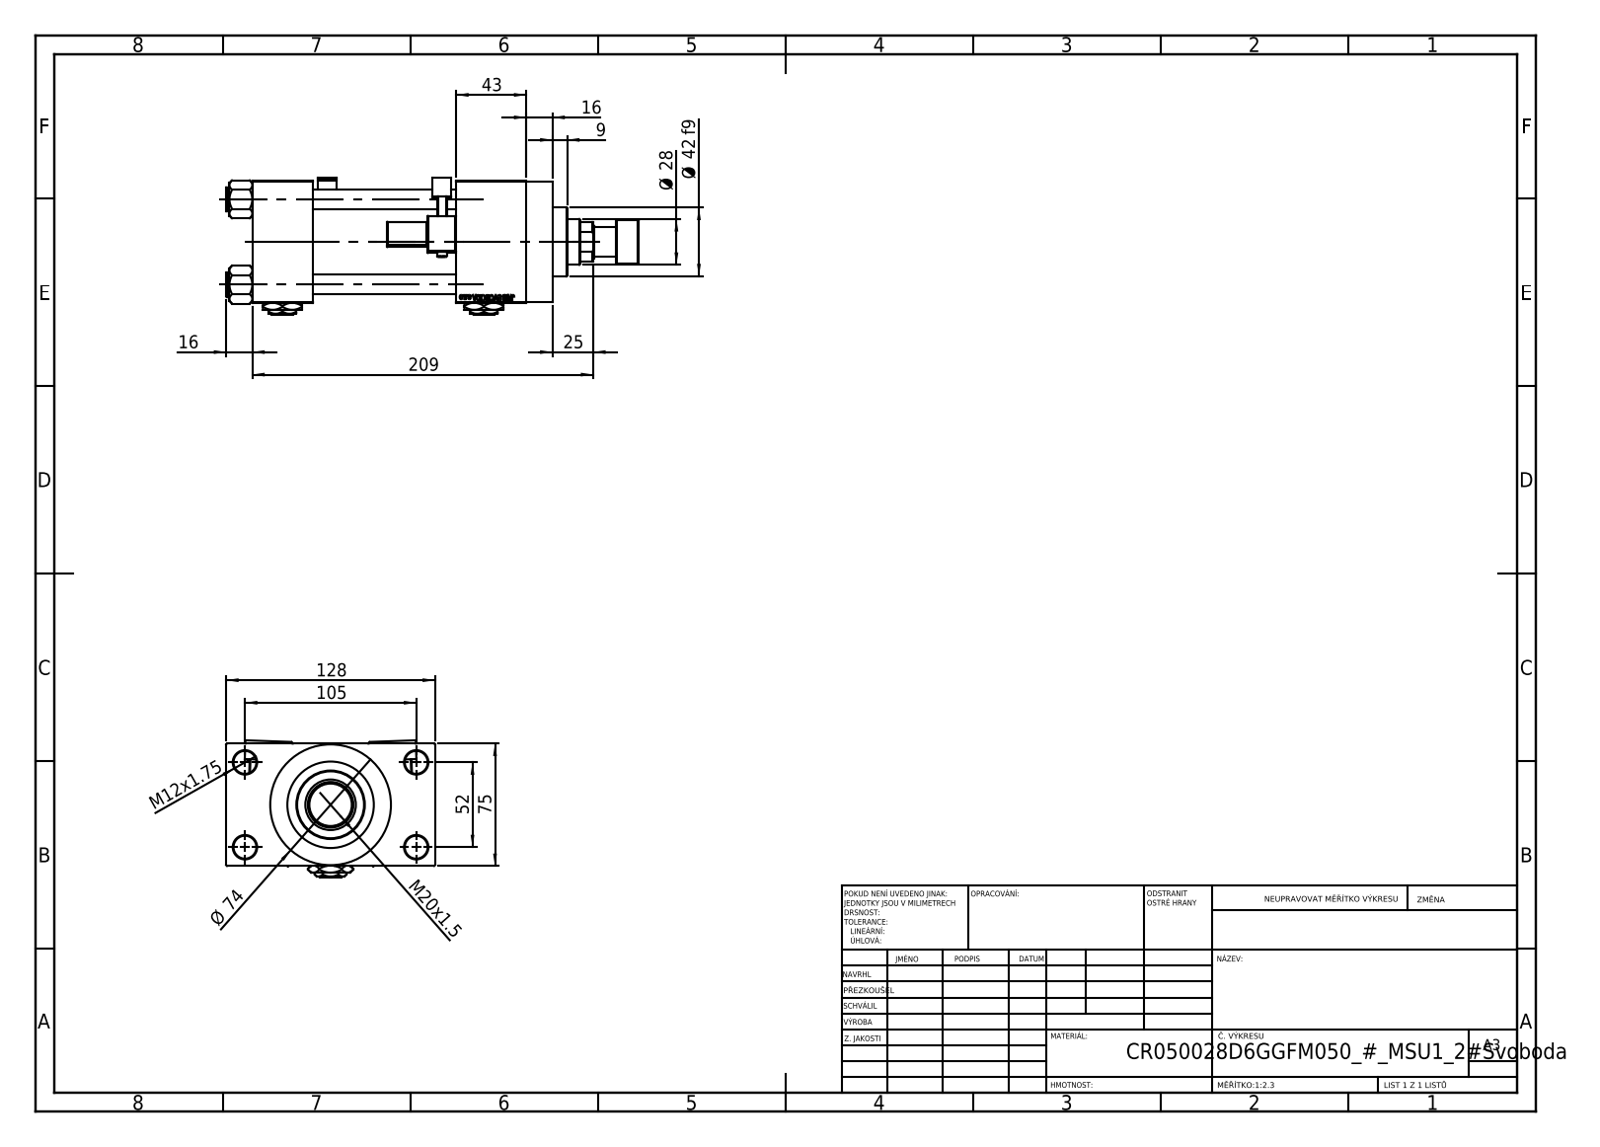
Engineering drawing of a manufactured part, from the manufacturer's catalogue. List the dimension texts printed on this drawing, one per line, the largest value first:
209
128
105
75
Ø 74
52
43
Ø 42 f9
Ø 28
25
M20x1.5
16
16
M12x1.75
9
